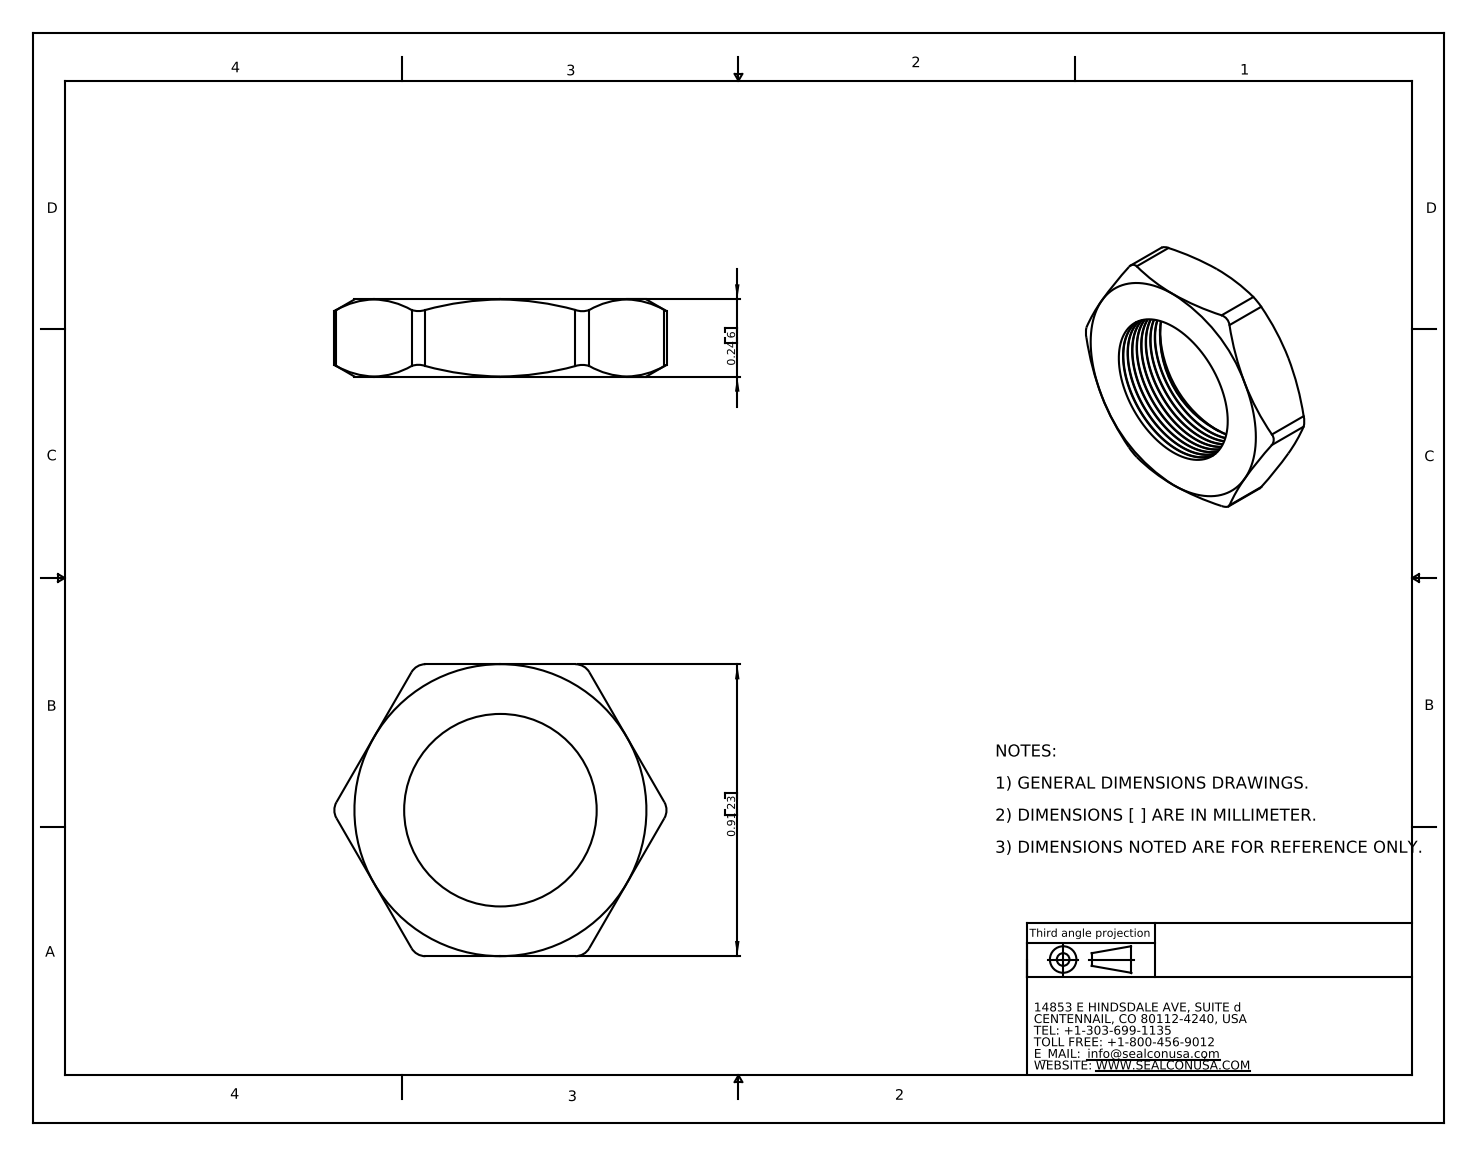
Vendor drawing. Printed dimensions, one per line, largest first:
0.91 23
0.24 6
